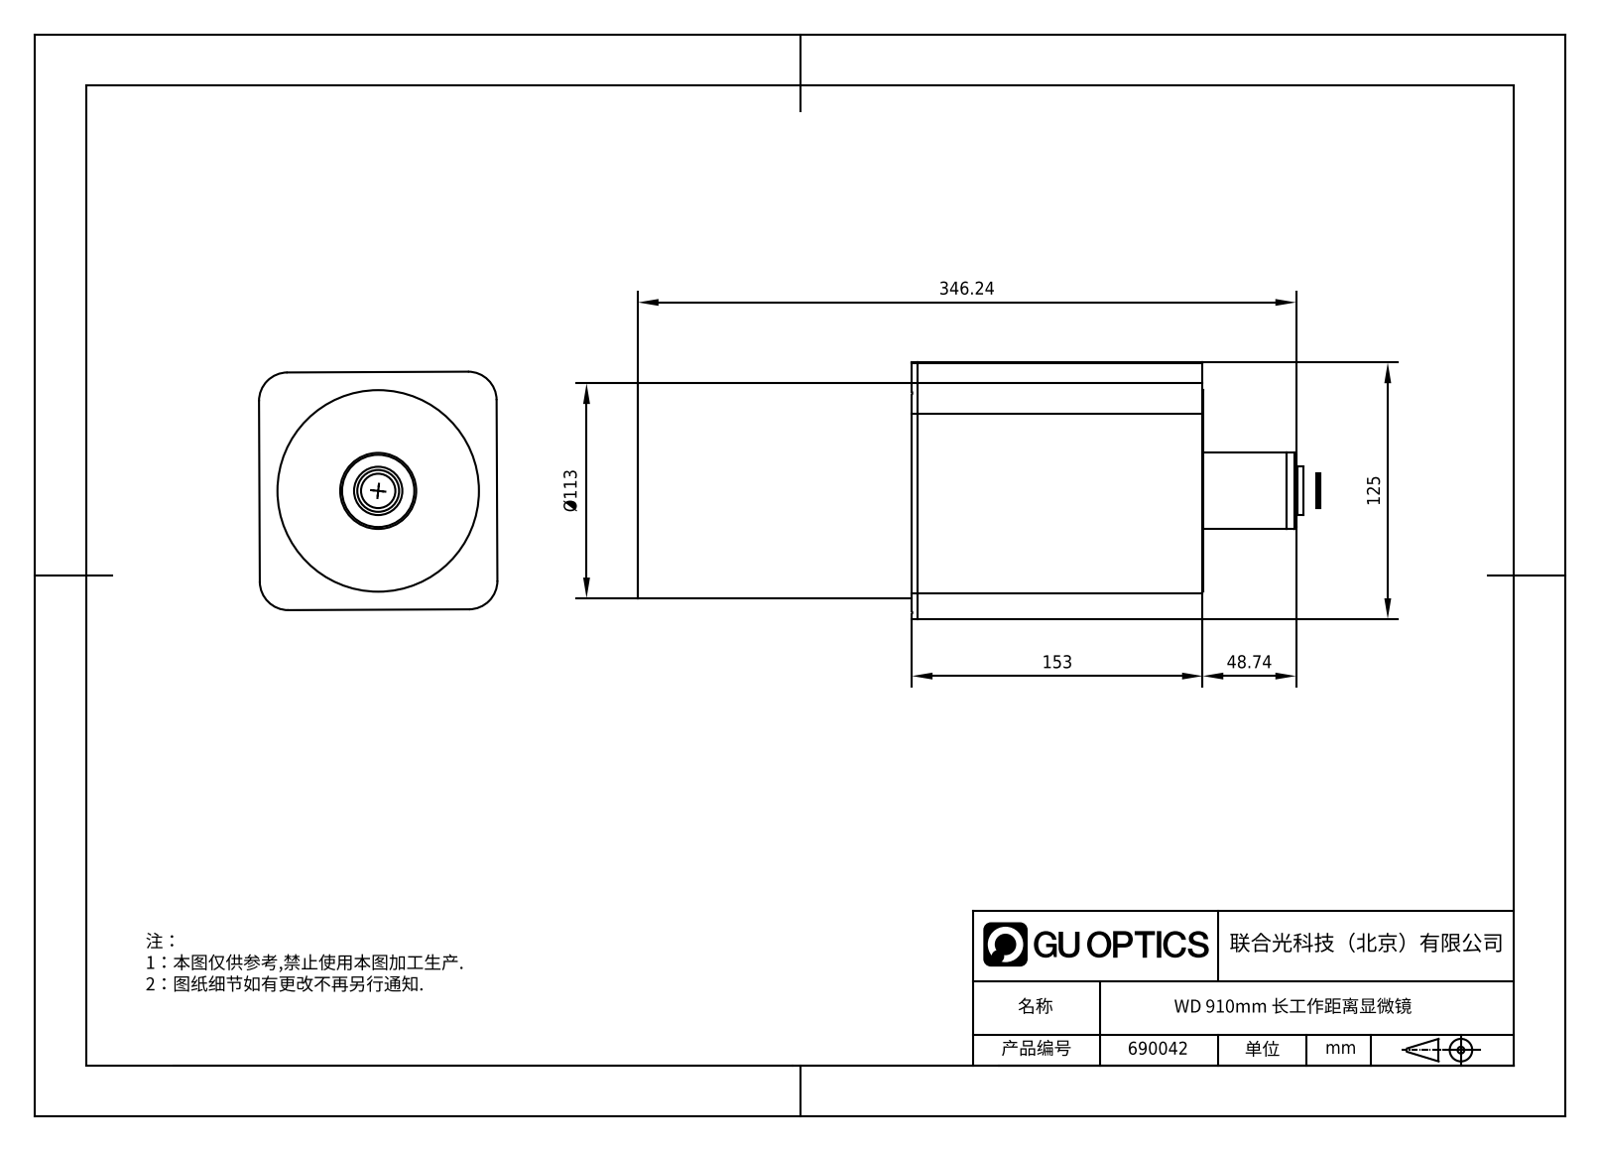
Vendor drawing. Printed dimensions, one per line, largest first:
346.24
153
125
Ø113
48.74
